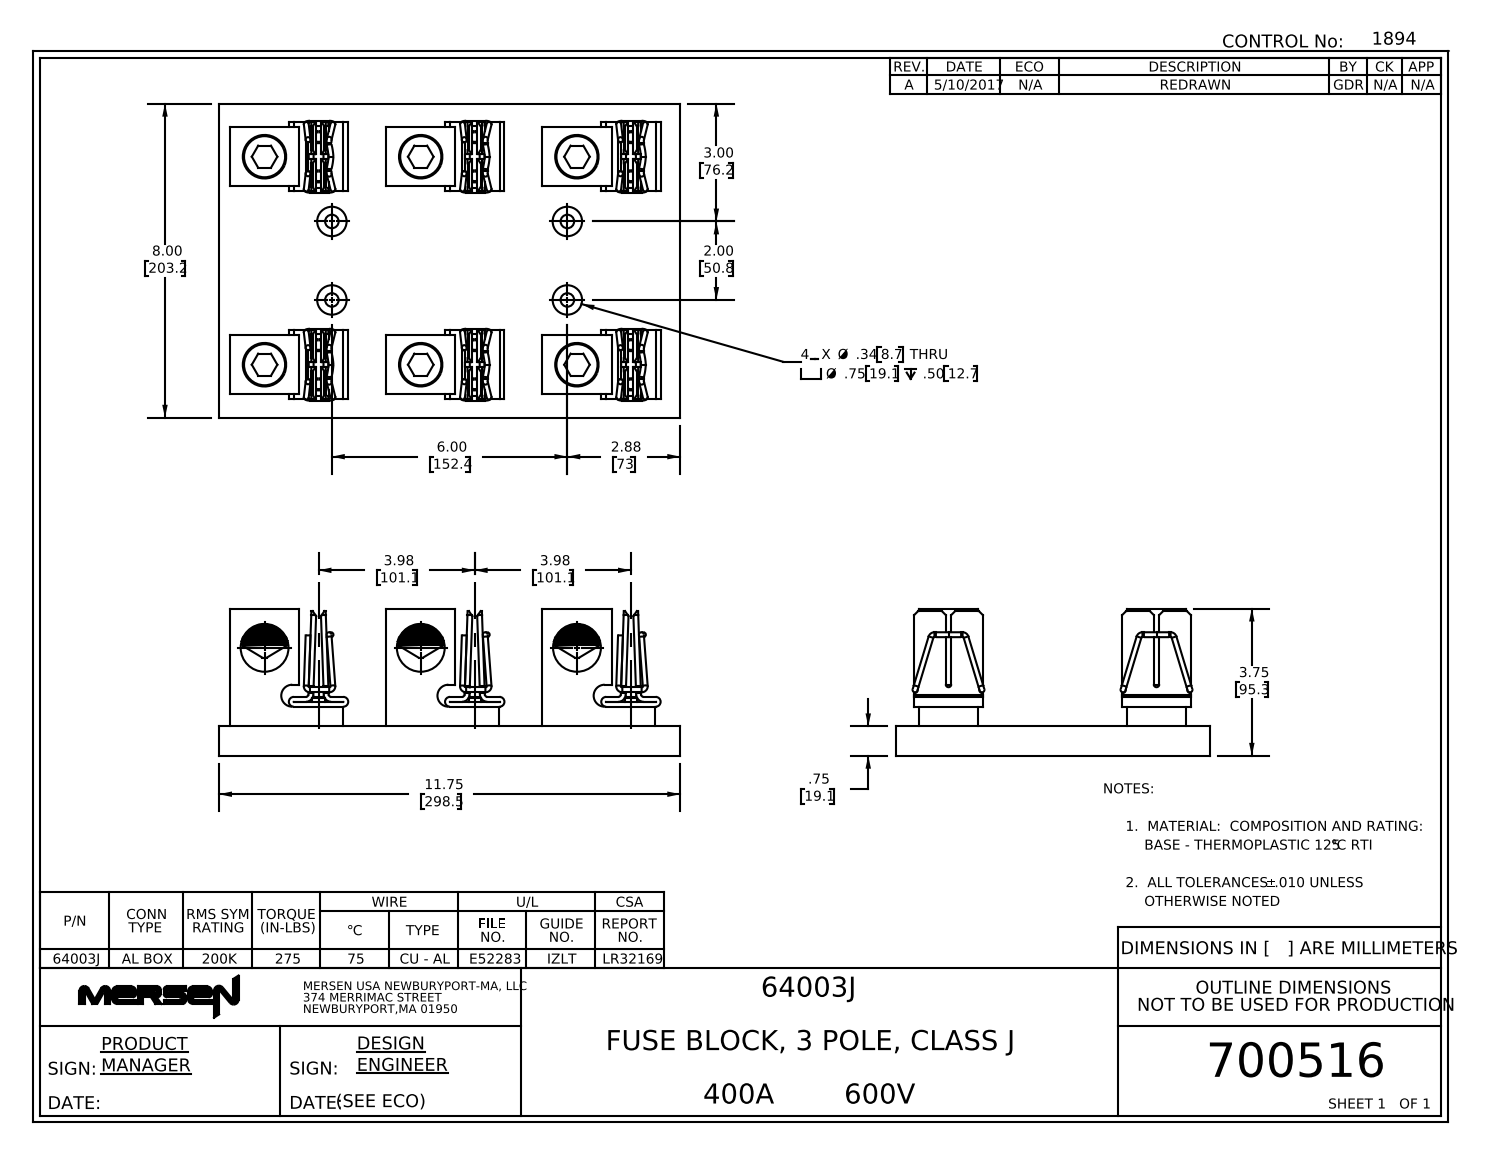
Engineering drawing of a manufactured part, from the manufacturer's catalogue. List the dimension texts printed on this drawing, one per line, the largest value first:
11.75 298.5
8.00 203.2
6.00 152.4
3.98 101.1
3.98 101.1
3.75 95.3
3.00 76.2
2.88 73
2.00 50.8
.75 19.1
4 X Ø .34 8.7 THRU Ø .75 19.1 .50 12.7
